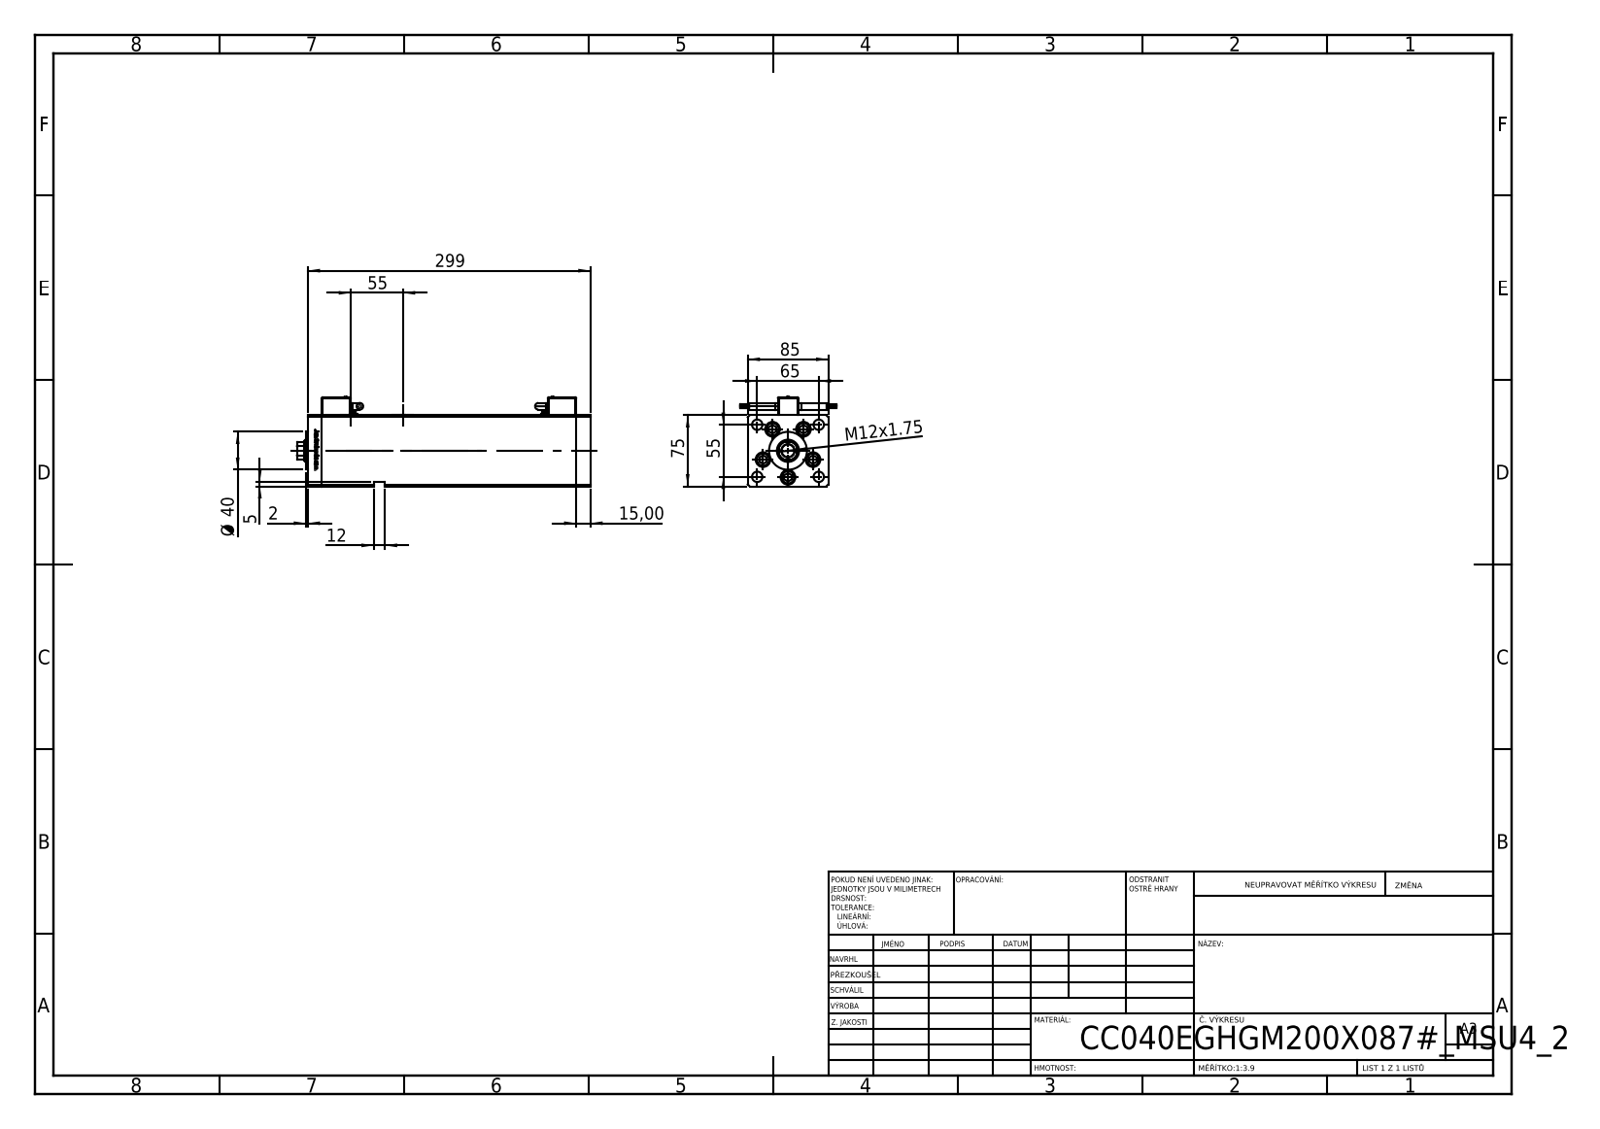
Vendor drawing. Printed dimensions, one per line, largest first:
299
85
75
65
55
55
Ø 40
15,00
12
M12x1.75
5
2
